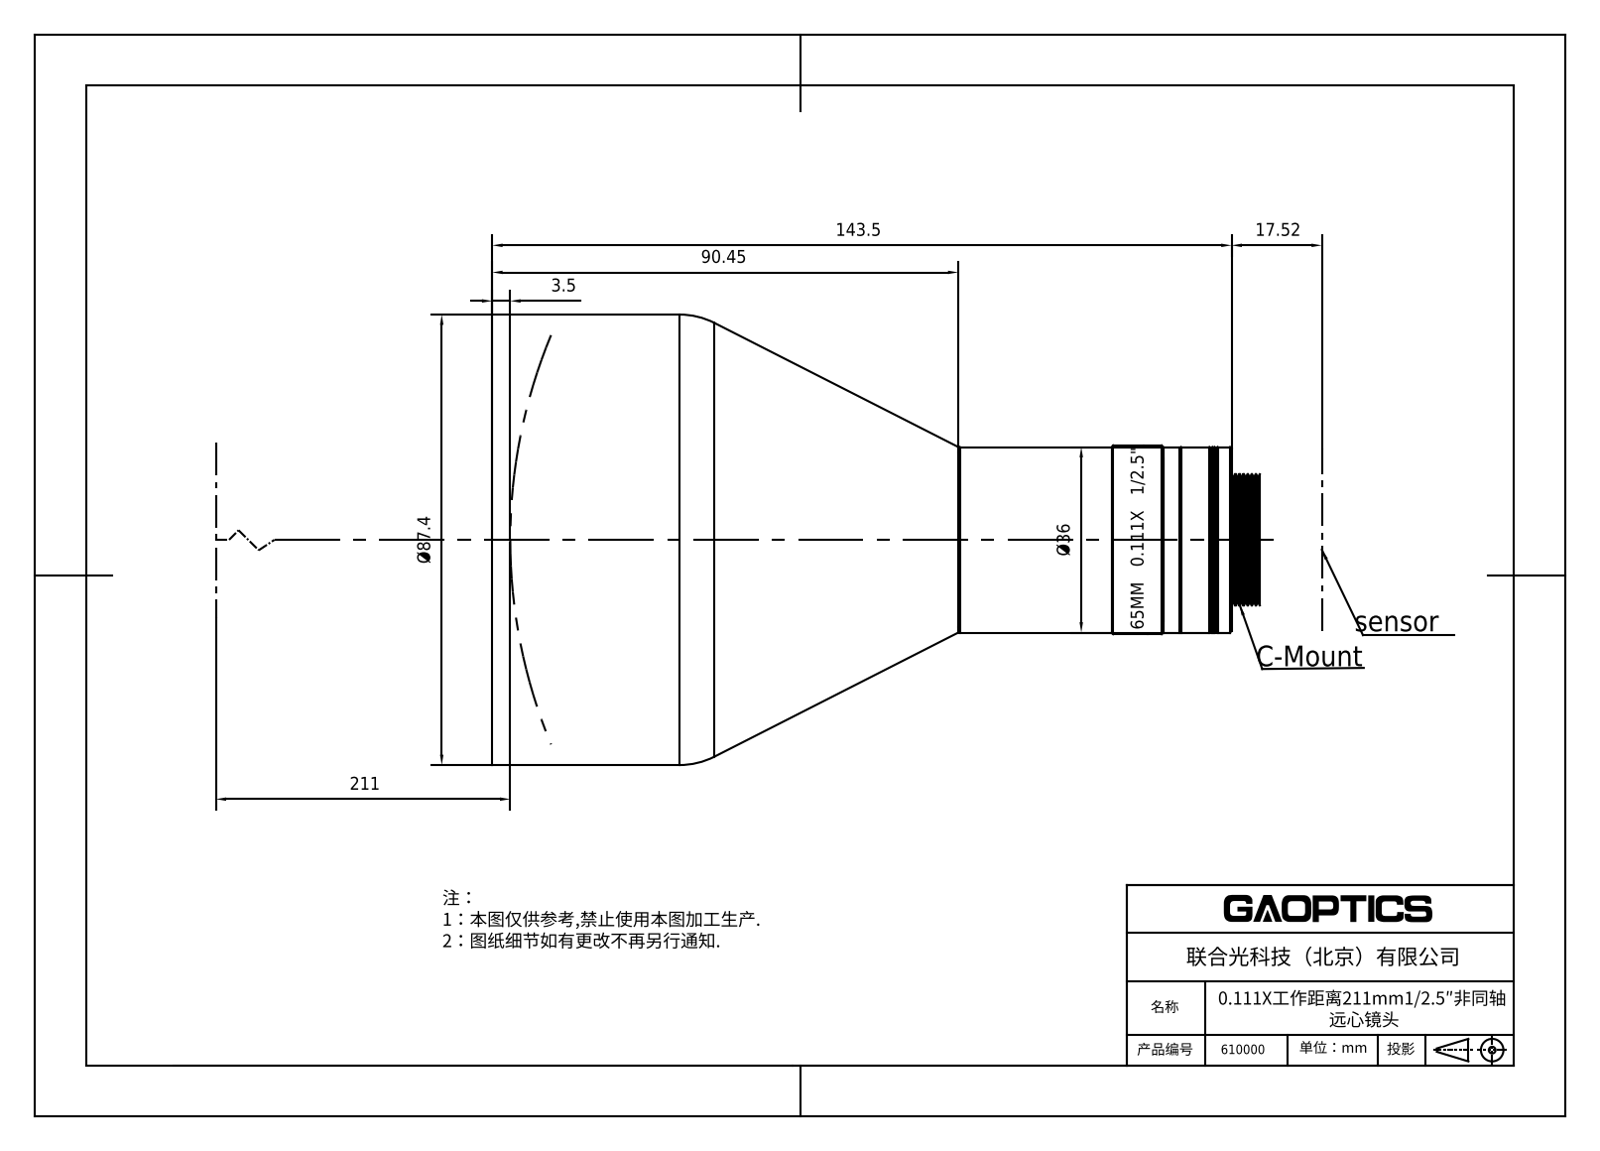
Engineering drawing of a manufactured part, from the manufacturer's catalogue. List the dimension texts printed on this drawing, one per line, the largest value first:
211
143.5
90.45
Ø87.4
Ø36
17.52
3.5
